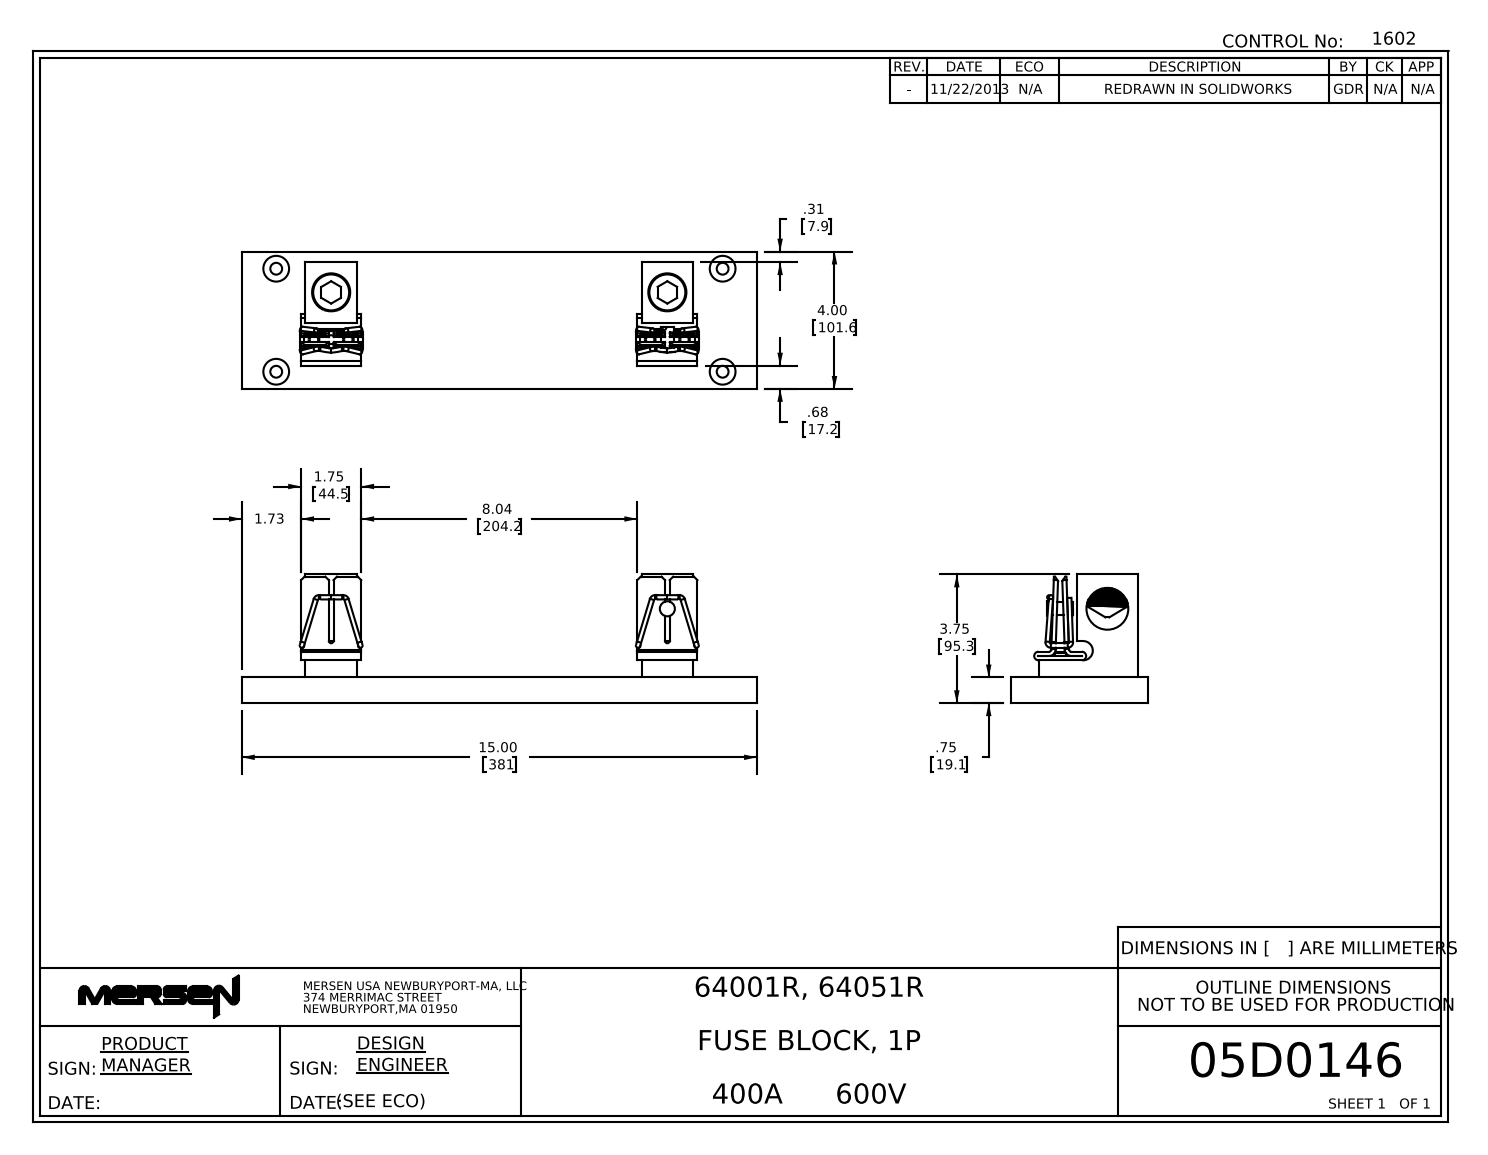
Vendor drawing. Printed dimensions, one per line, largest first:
15.00 381
8.04 204.2
4.00 101.6
3.75 95.3
1.75 44.5
1.73
.75 19.1
.68 17.2
.31 7.9
